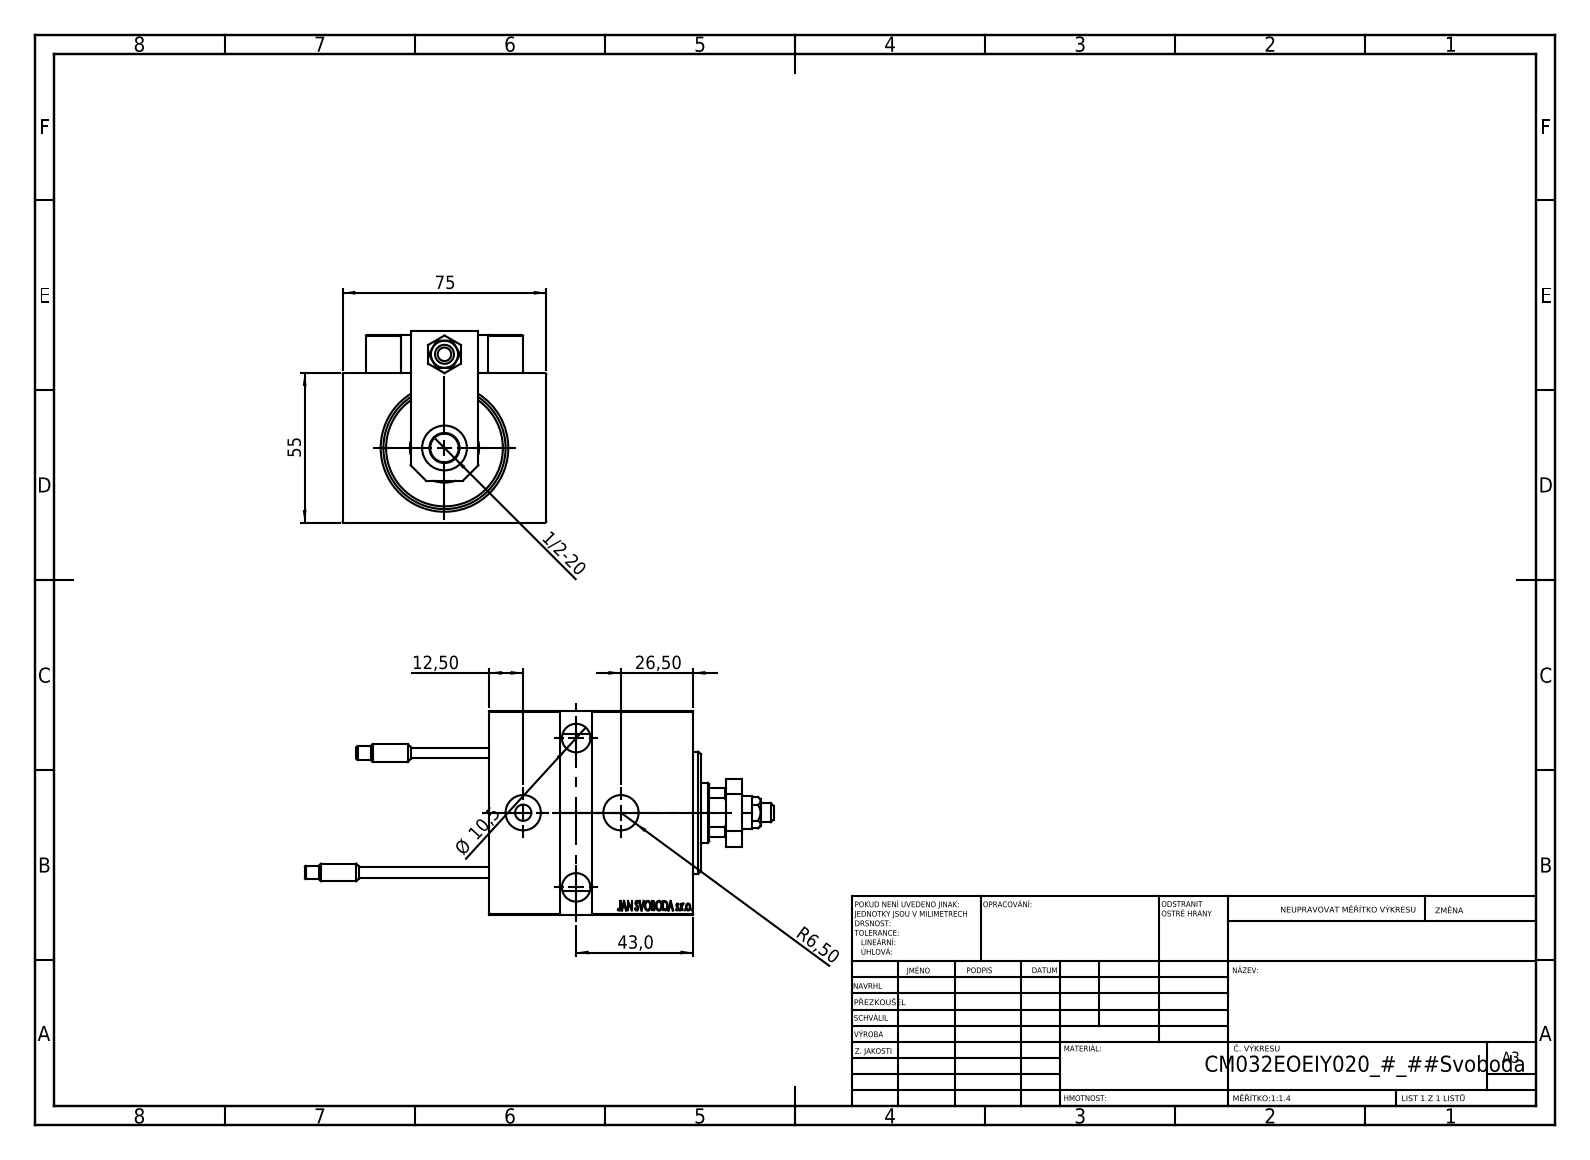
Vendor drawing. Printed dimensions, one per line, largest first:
75
55
43,0
26,50
12,50
Ø 10,5
R6,50
1/2-20
